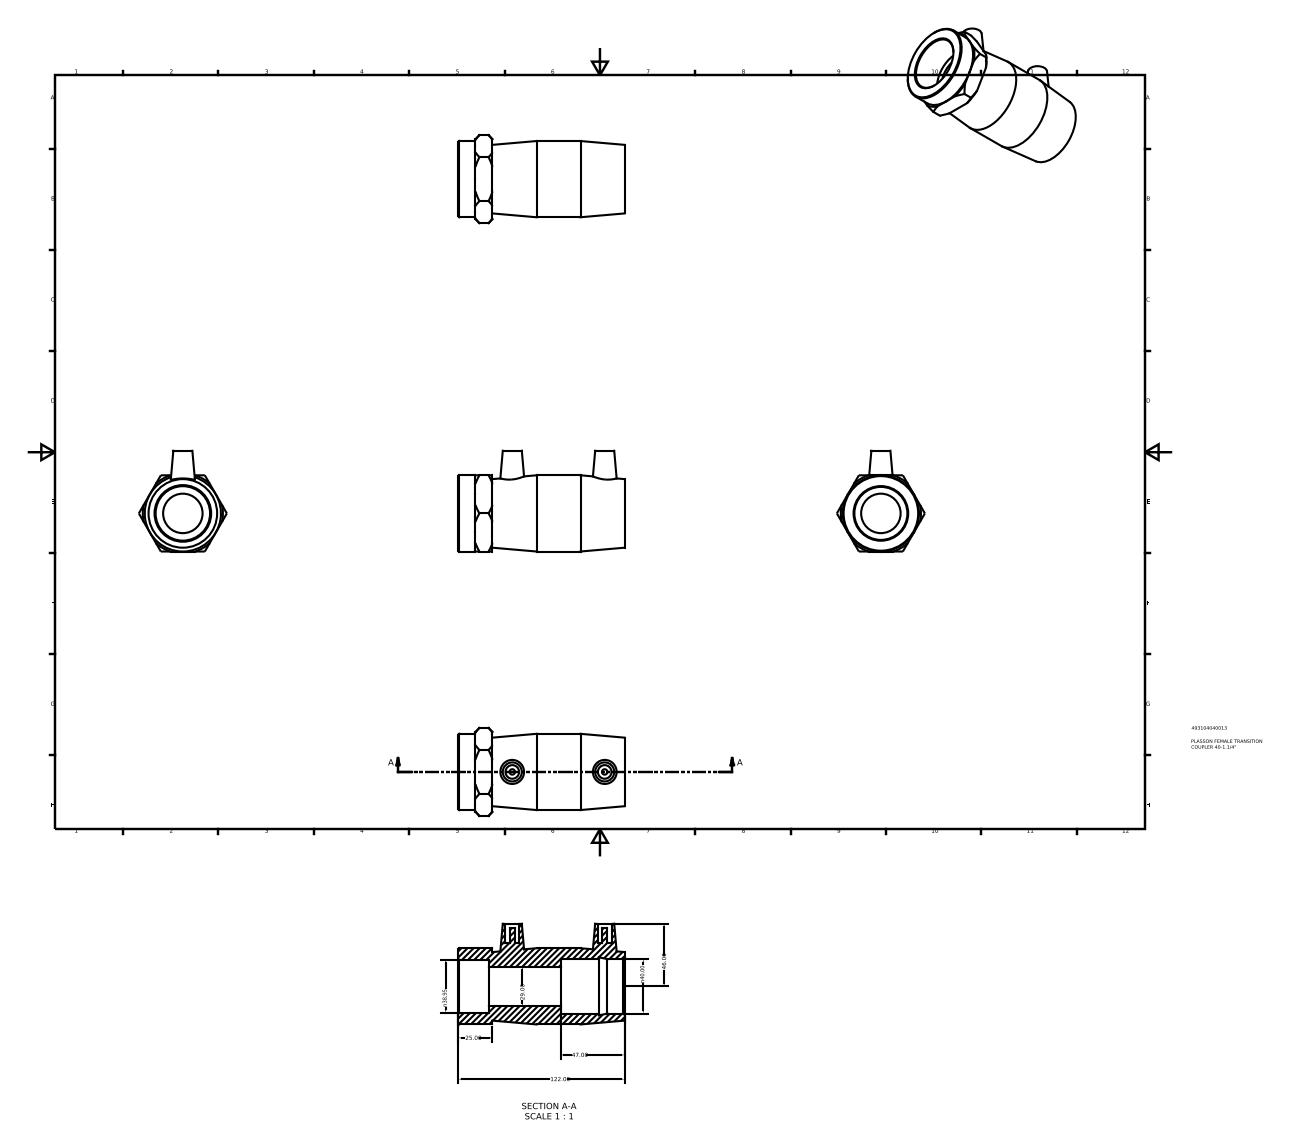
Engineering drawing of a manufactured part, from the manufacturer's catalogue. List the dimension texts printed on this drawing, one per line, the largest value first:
122.00
47.00
46.00
n40.00
n38.95
29.00
25.00
